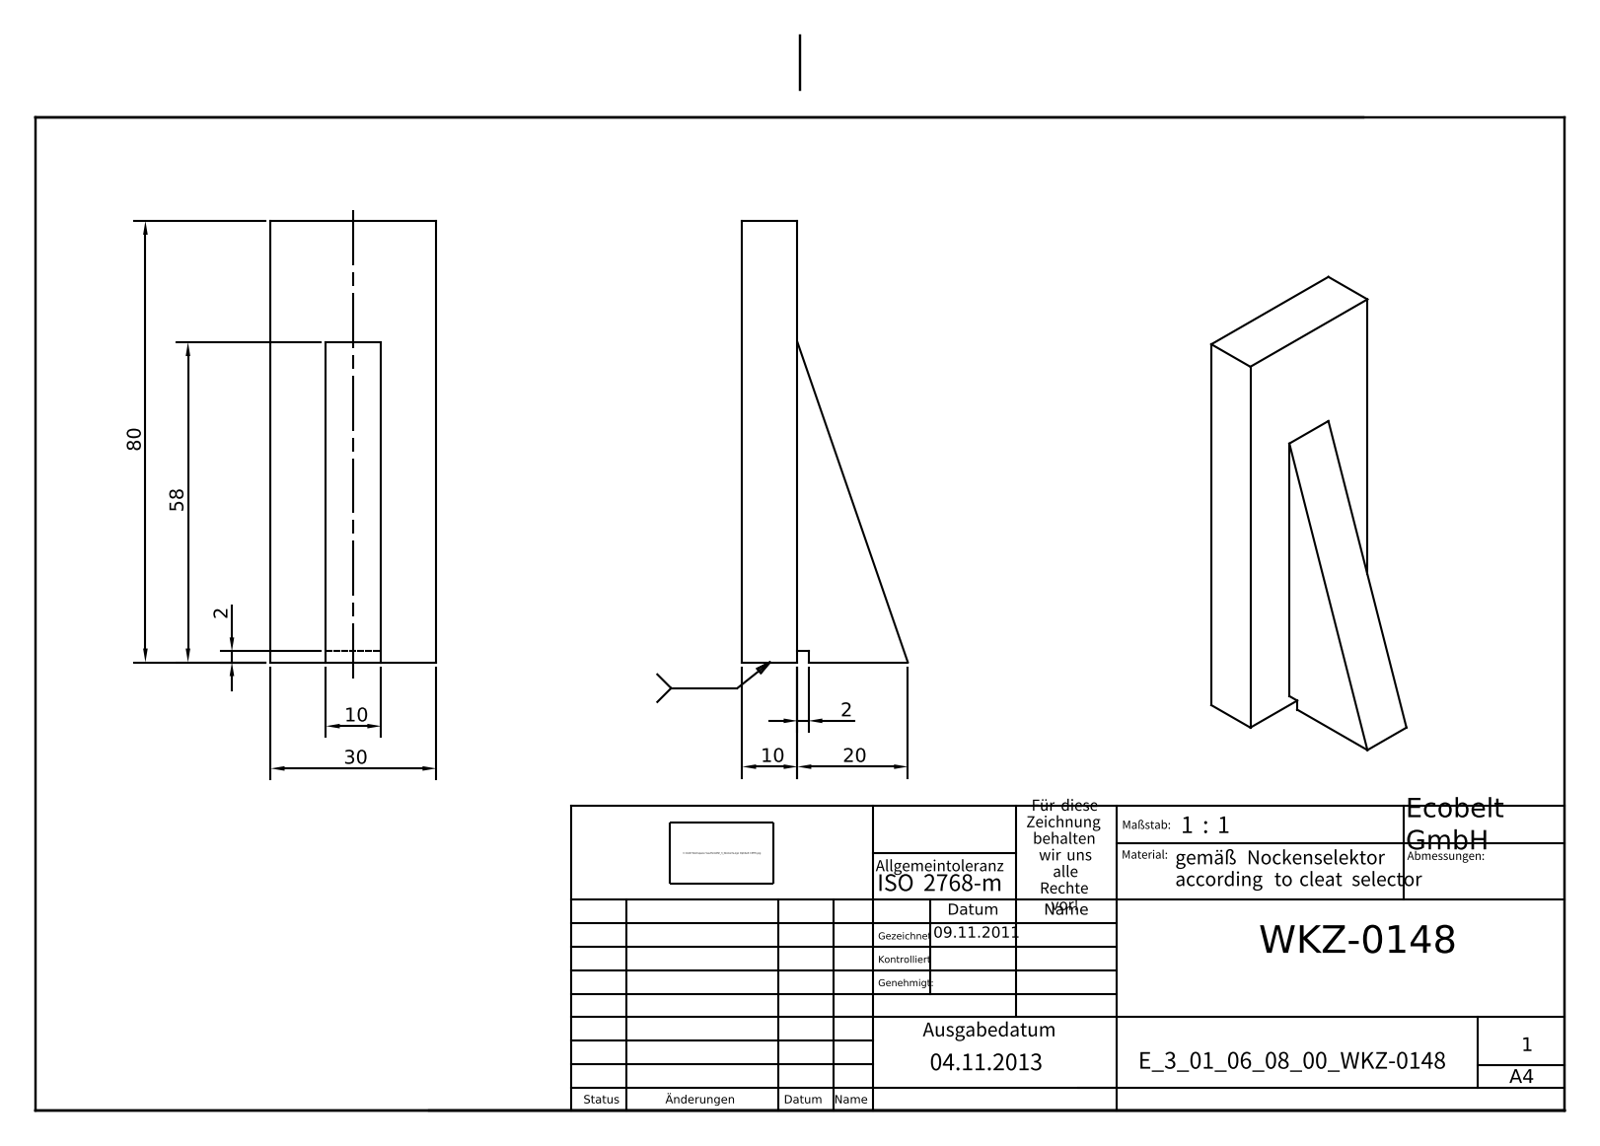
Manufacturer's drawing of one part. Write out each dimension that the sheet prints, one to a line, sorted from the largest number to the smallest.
80
58
30
20
10
10
2
2
